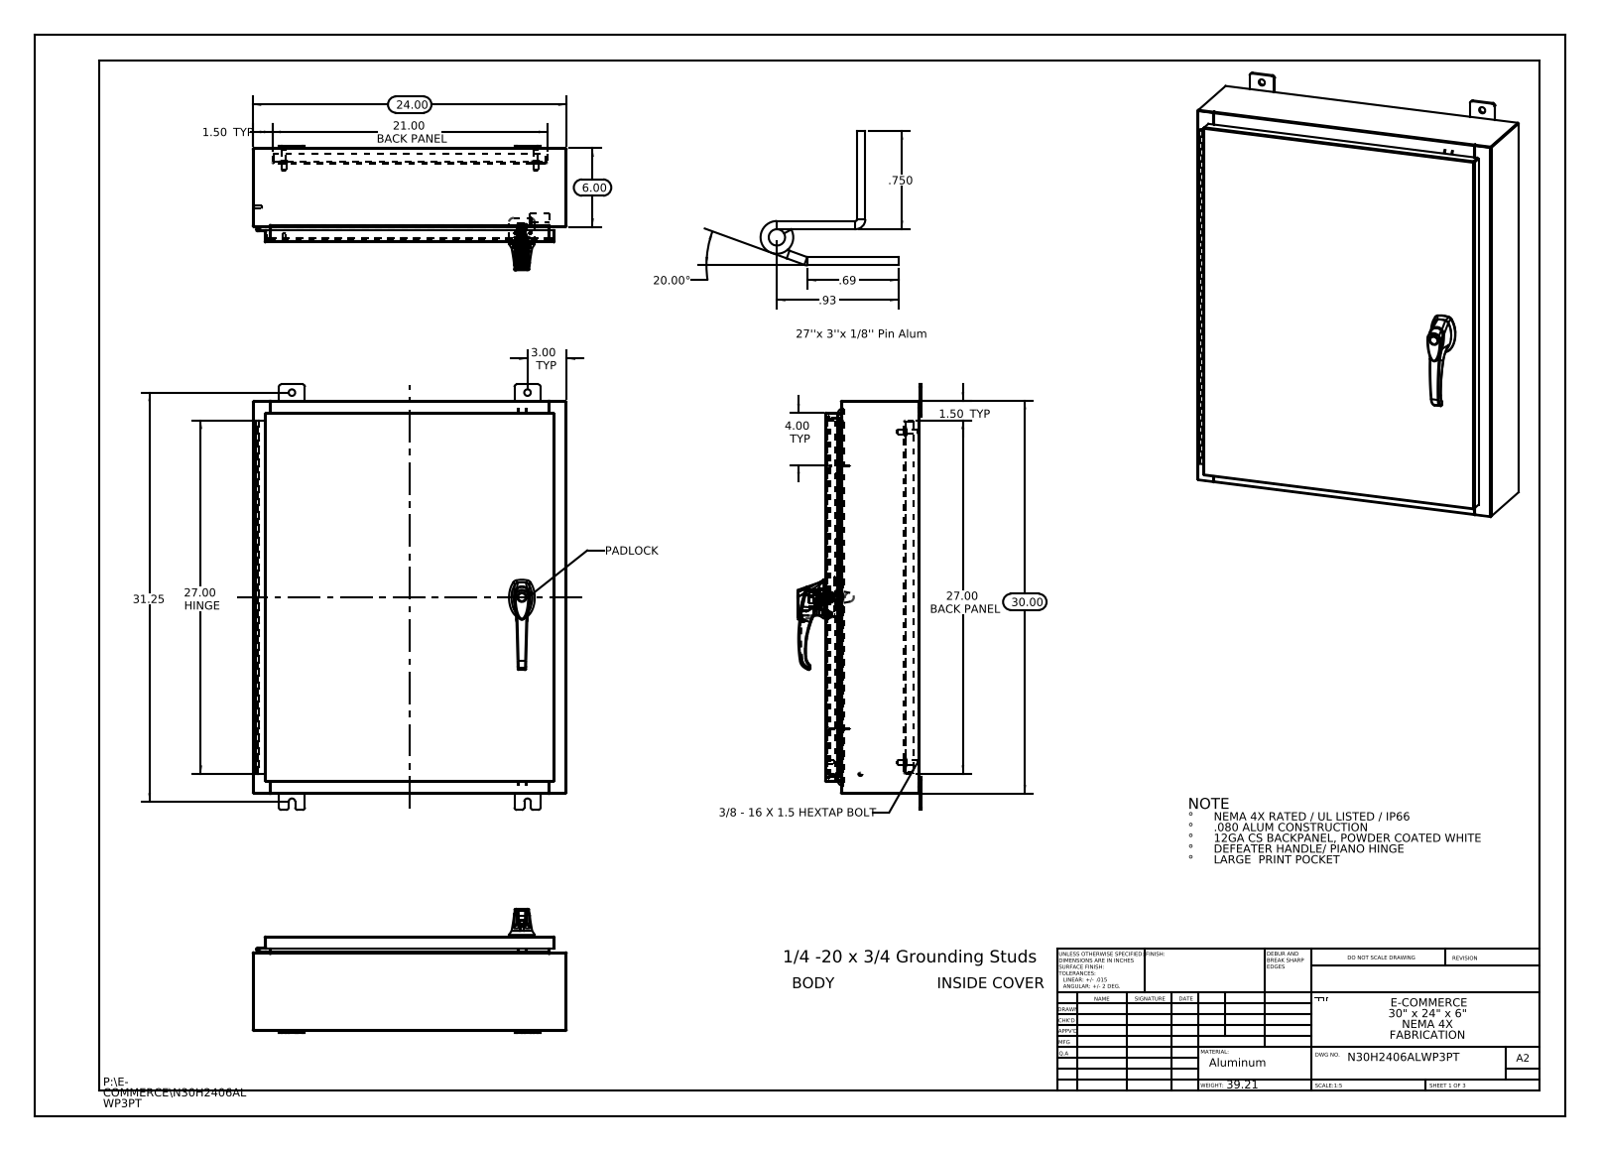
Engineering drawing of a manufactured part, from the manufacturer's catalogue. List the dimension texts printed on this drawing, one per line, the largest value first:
31.25
30.00
27.00 HINGE
27.00 BACK PANEL
24.00
21.00 BACK PANEL
20.00°
6.00
4.00 TYP
3.00 TYP
1.50 TYP
1.50 TYP
.93
.750
.69
